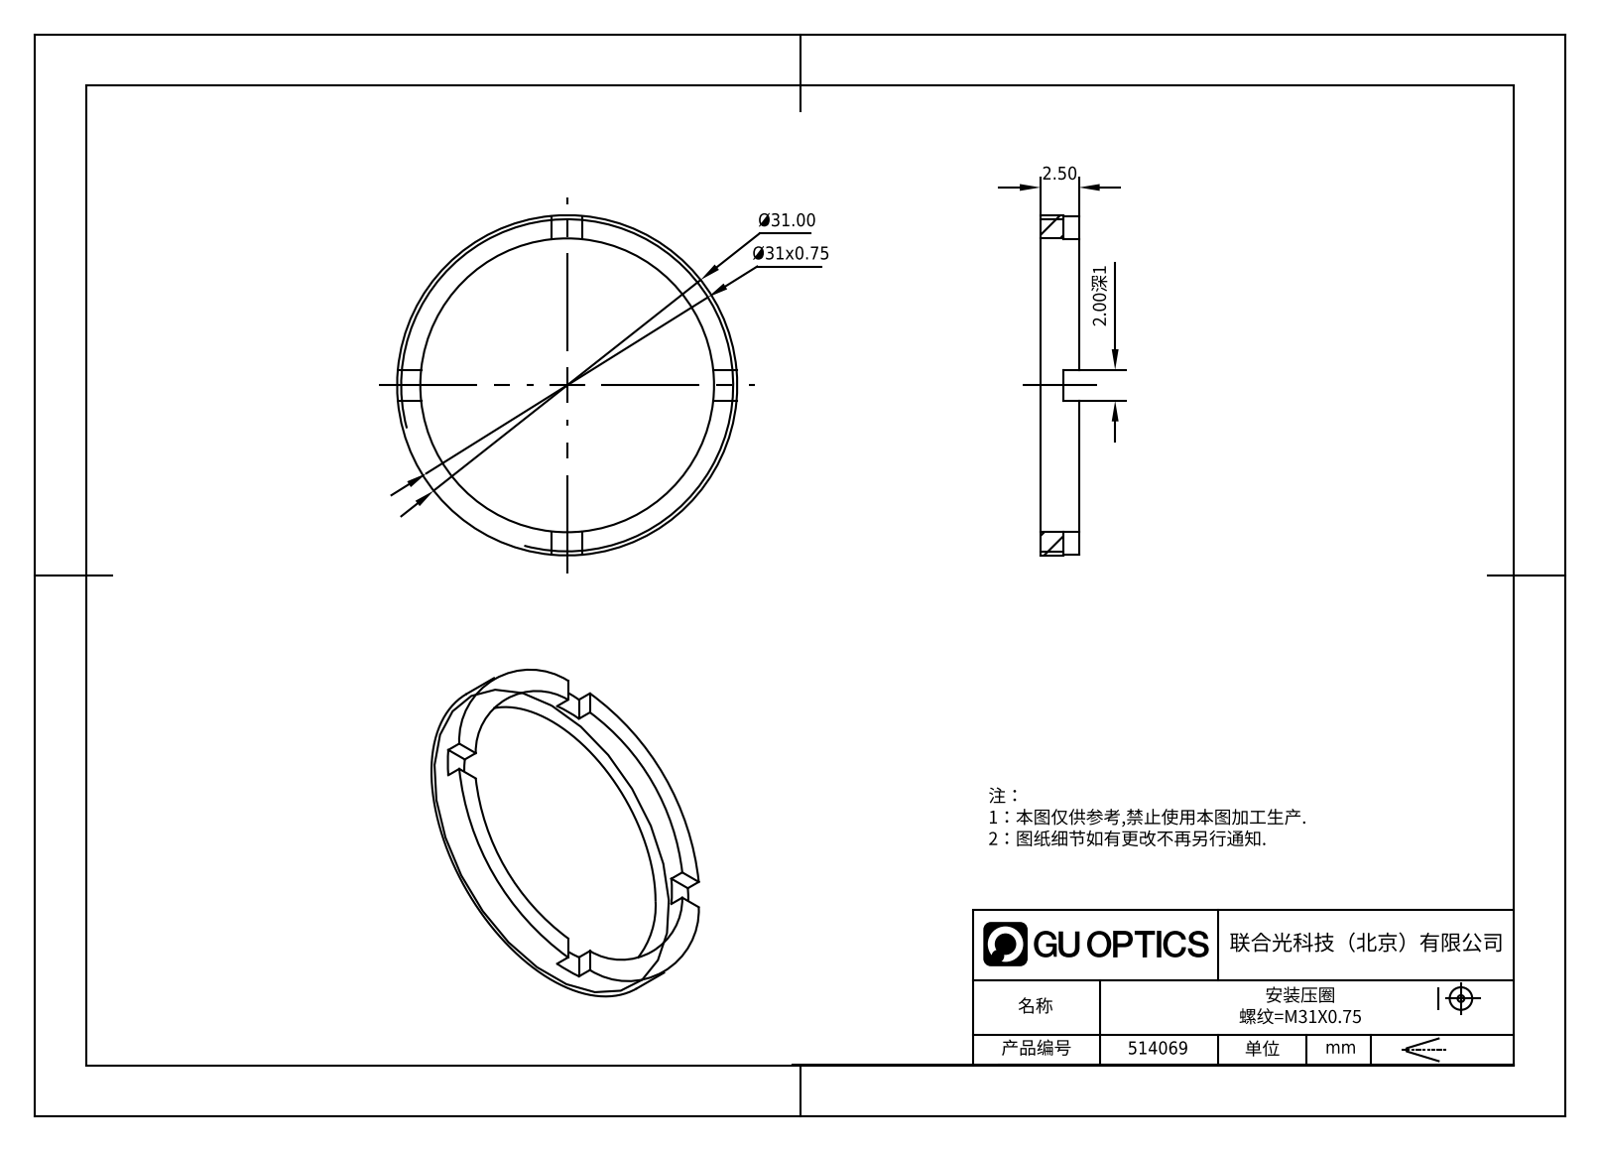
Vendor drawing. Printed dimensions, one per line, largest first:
Ø31.00
Ø31x0.75
2.50
2.00深1
